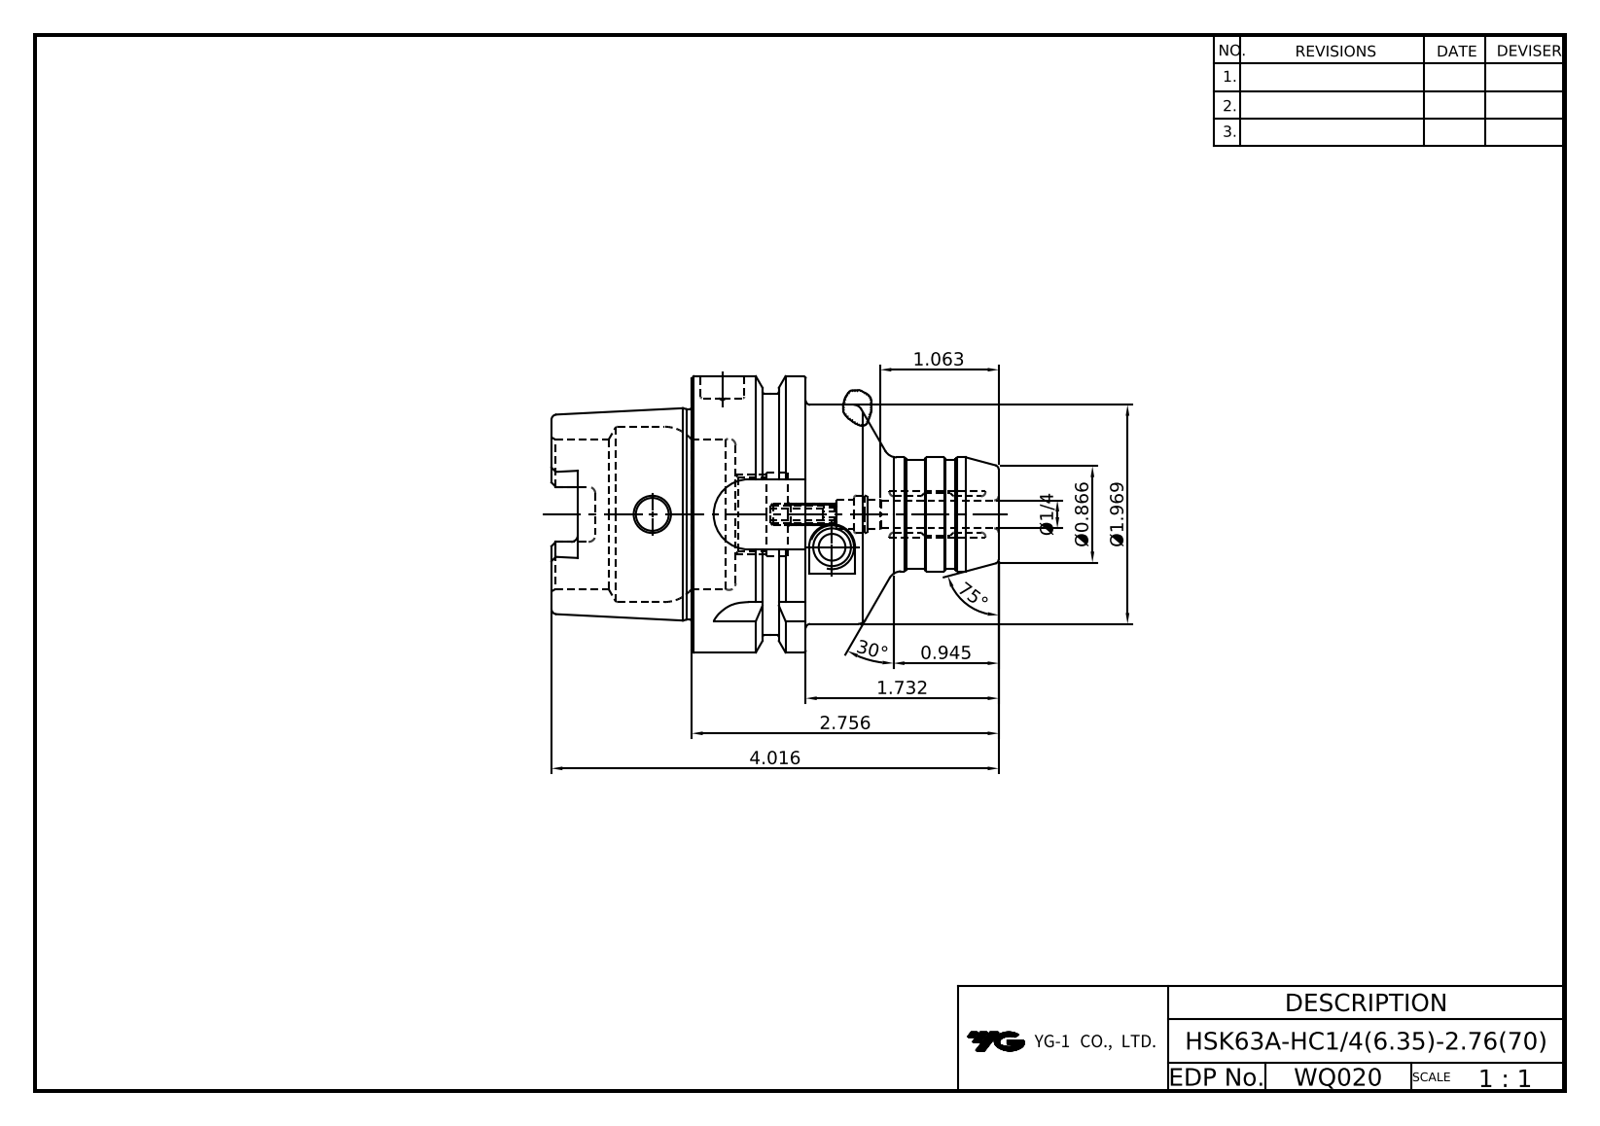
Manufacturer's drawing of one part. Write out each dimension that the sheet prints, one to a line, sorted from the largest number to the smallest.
75°
30°
4.016
2.756
Ø1.969
1.732
1.063
0.945
Ø0.866
Ø1/4
